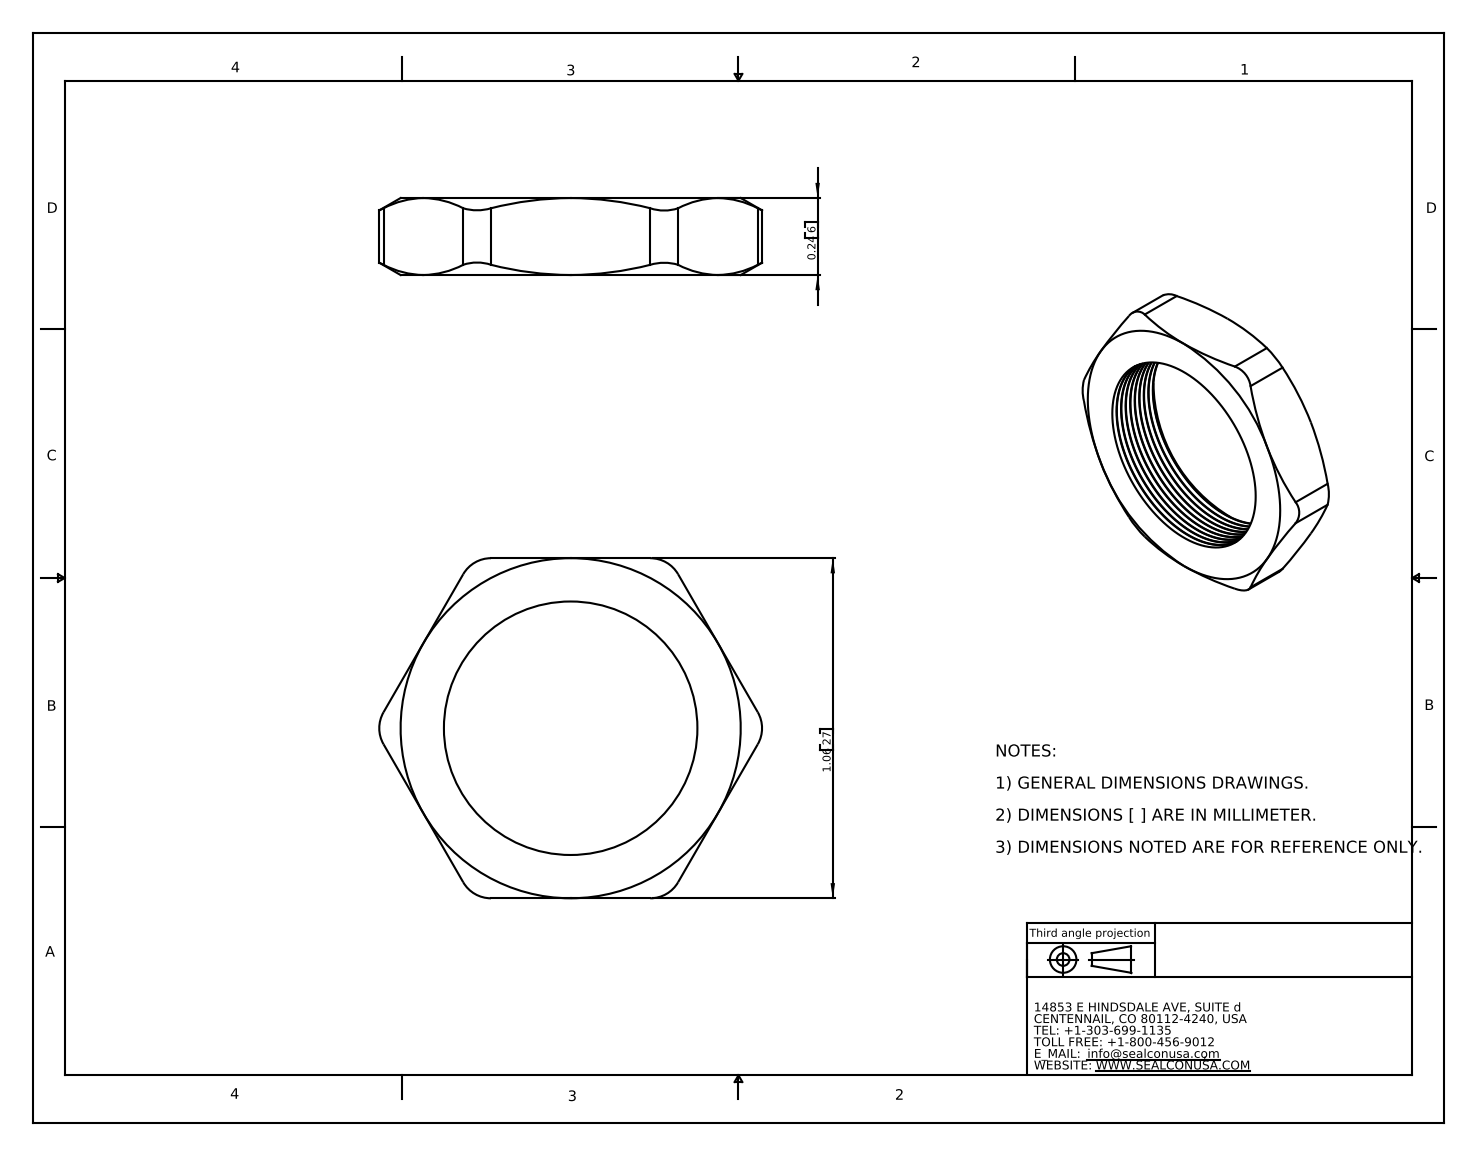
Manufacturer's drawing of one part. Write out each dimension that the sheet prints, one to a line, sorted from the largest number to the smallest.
1.06 27
0.24 6
